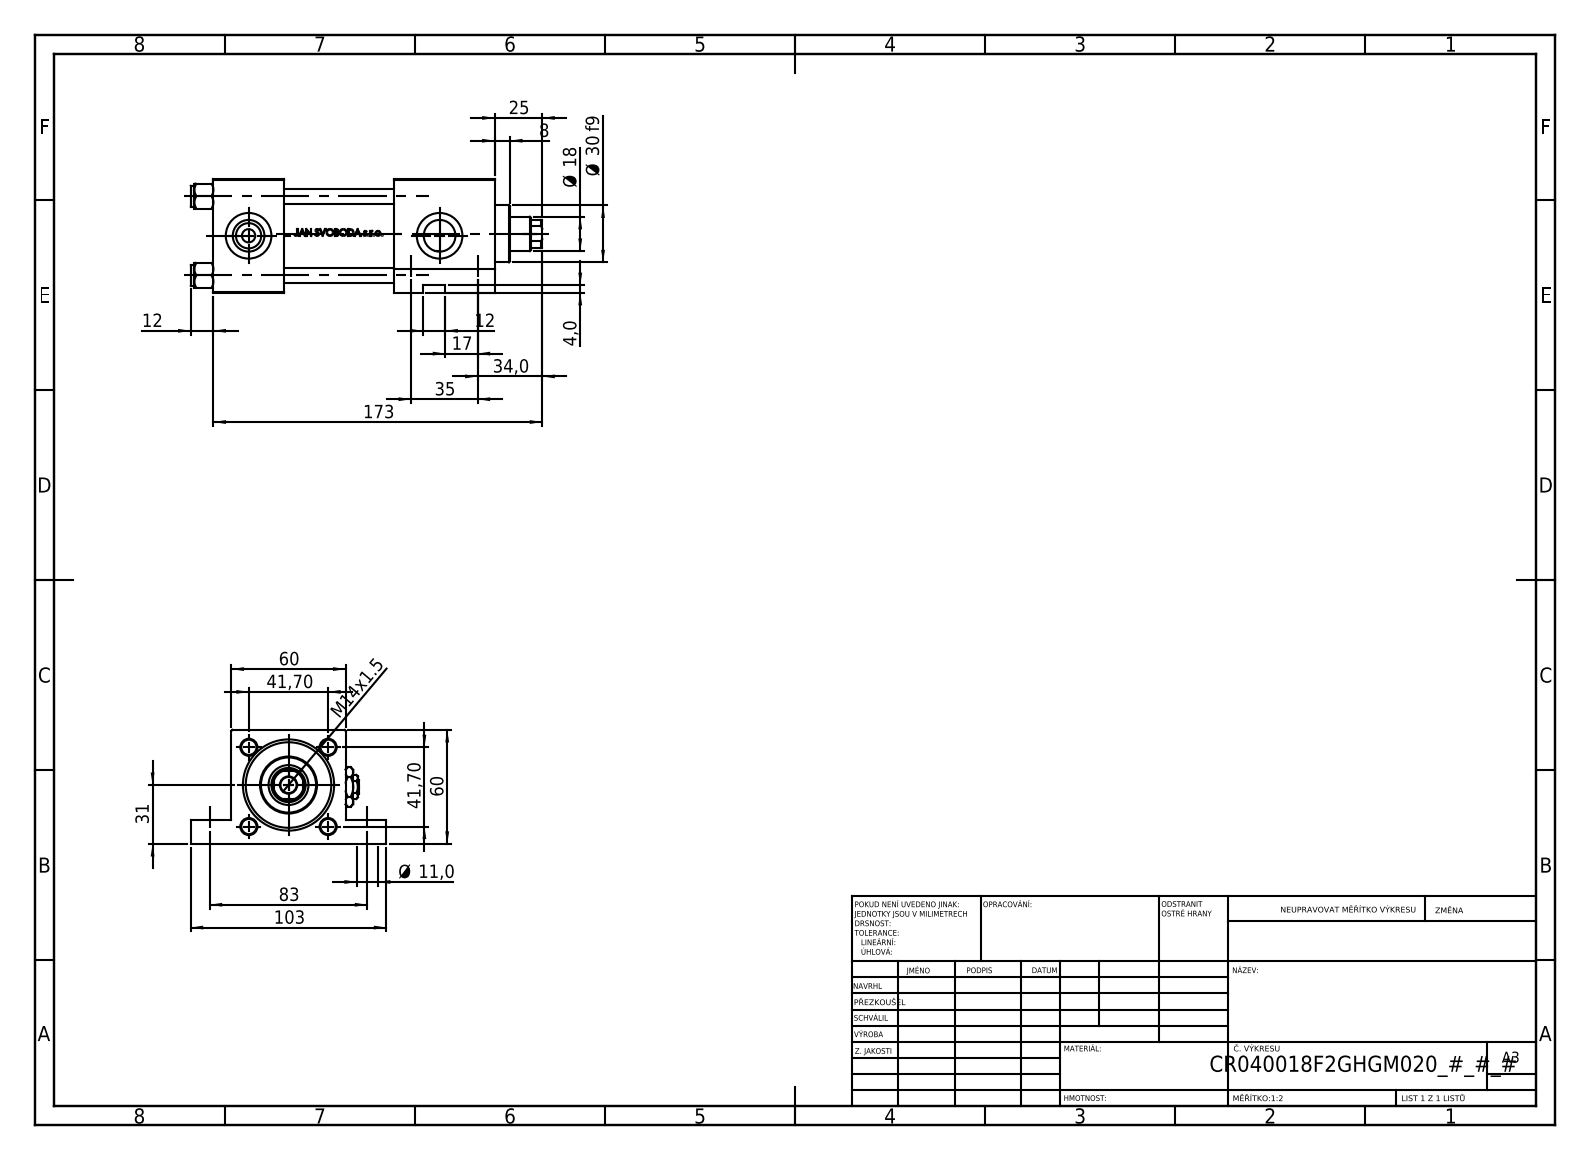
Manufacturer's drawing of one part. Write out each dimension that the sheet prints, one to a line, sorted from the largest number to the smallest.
173
103
83
60
60
41,70
41,70
35
34,0
31
Ø 30 f9
25
Ø 18
17
M14x1.5
12
12
Ø 11,0
8
4,0
